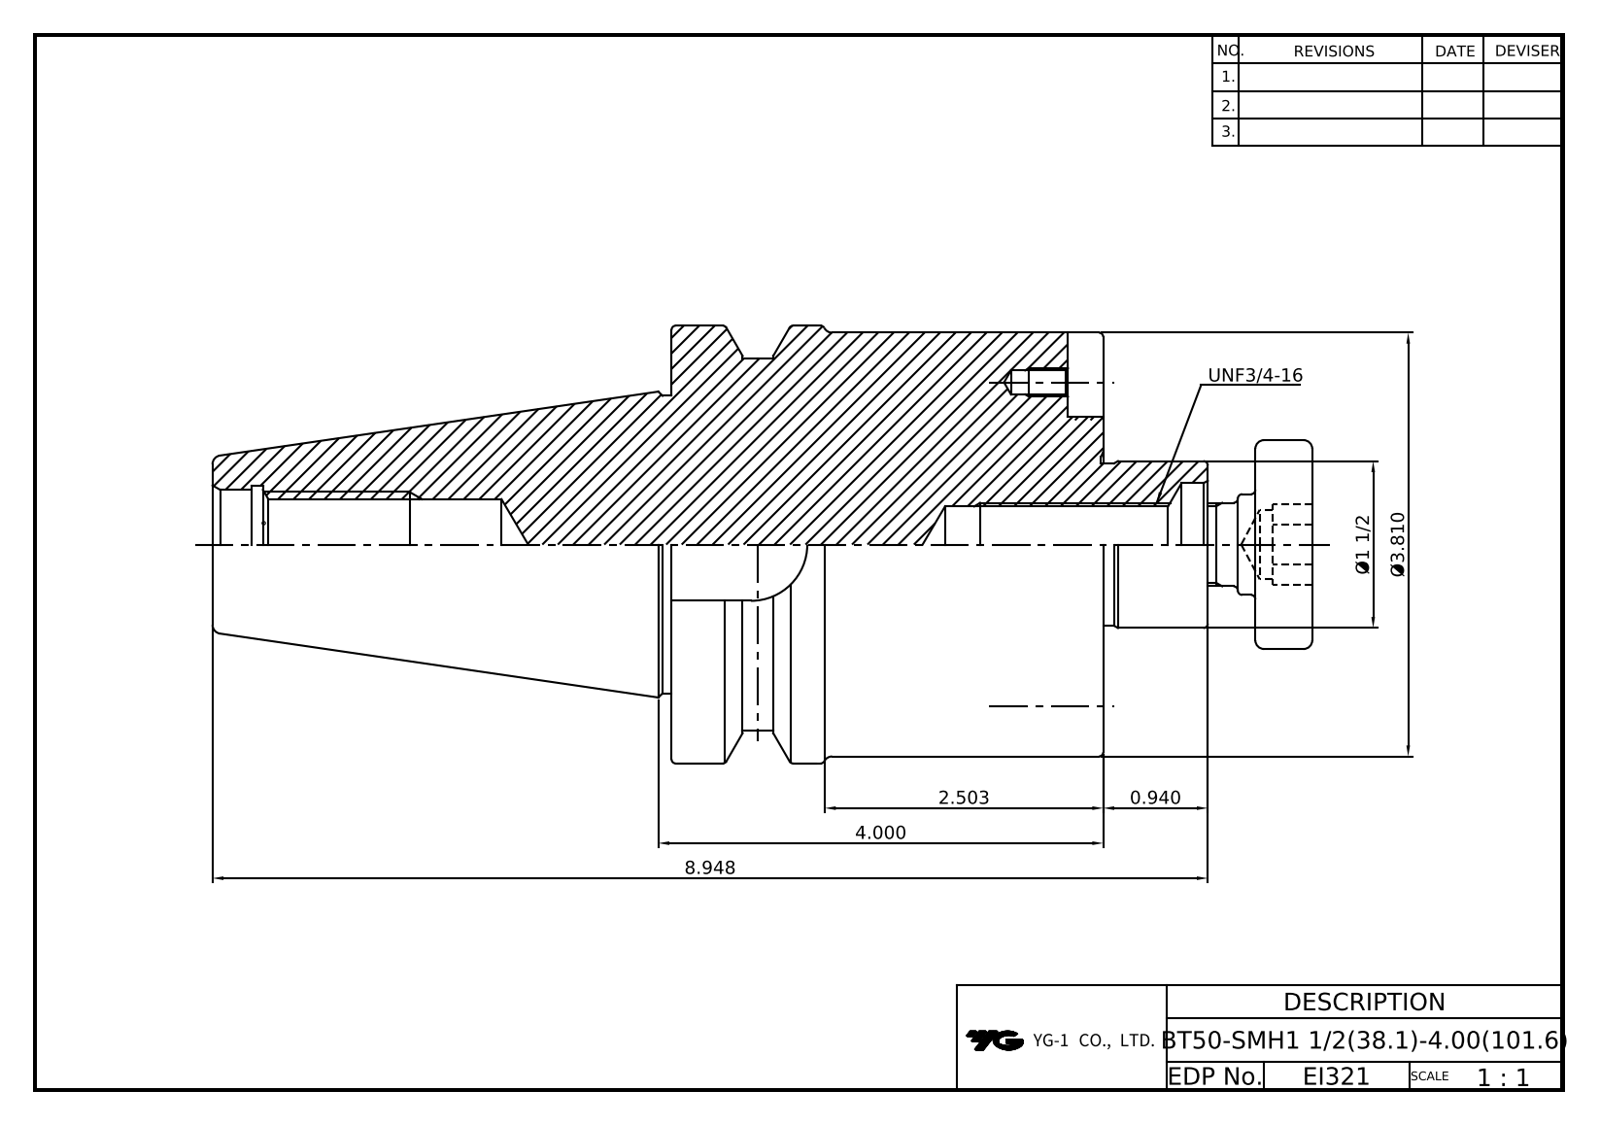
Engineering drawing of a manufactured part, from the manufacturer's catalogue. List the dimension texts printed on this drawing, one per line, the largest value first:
8.948
4.000
Ø3.810
2.503
Ø1 1/2
0.940
